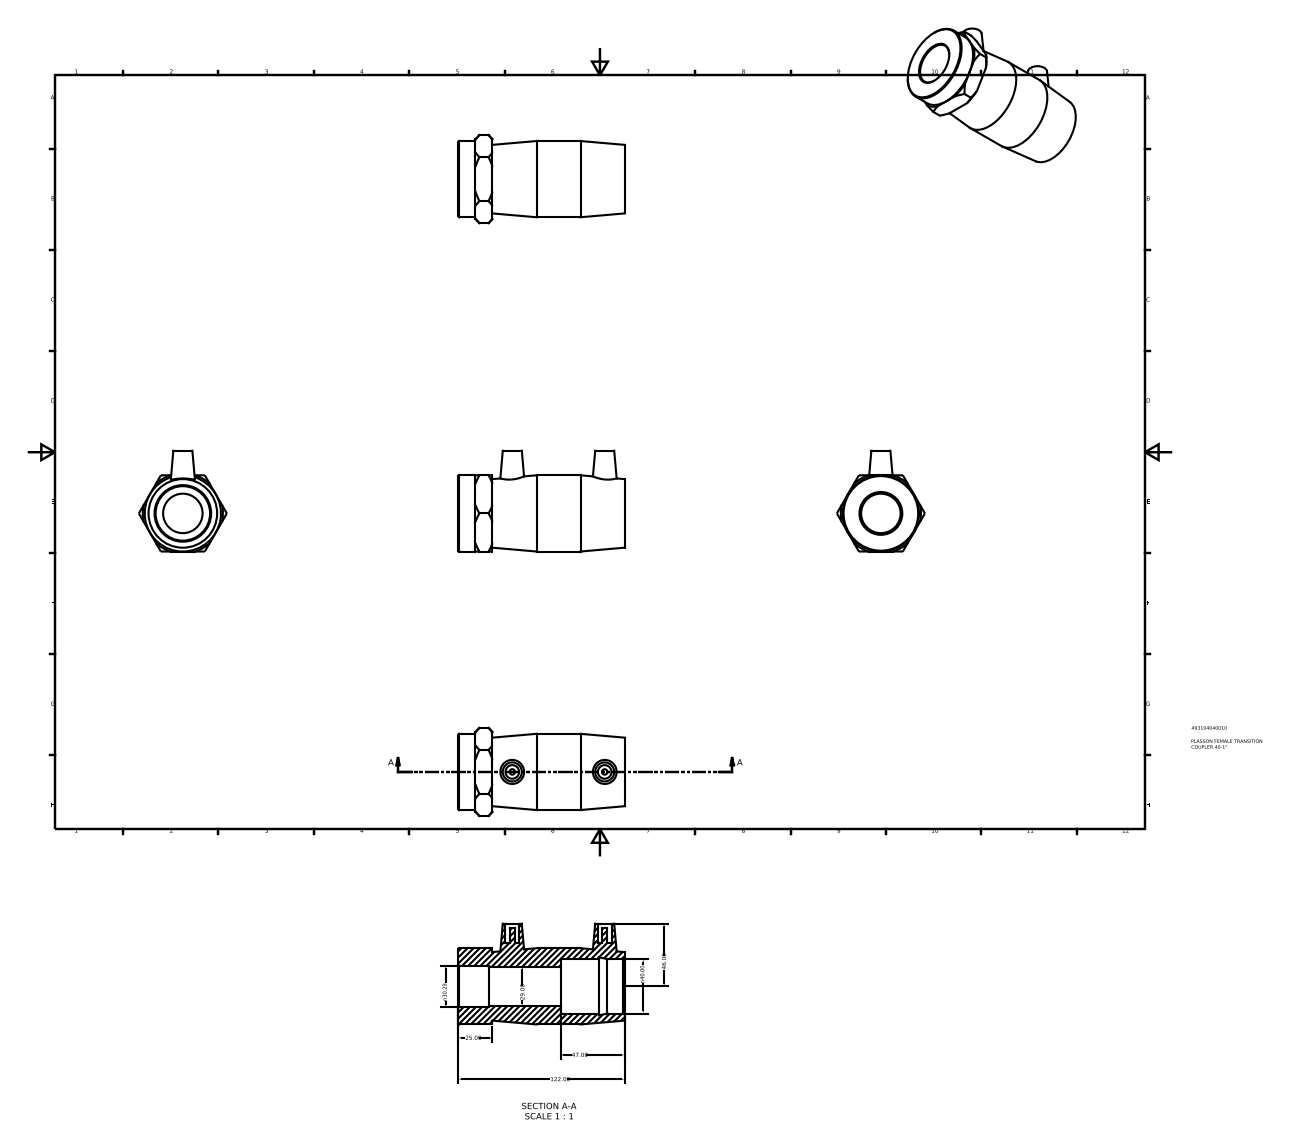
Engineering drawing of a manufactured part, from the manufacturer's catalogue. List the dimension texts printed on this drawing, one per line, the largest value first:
122.00
47.00
46.00
n40.00
n30.29
29.00
25.00
